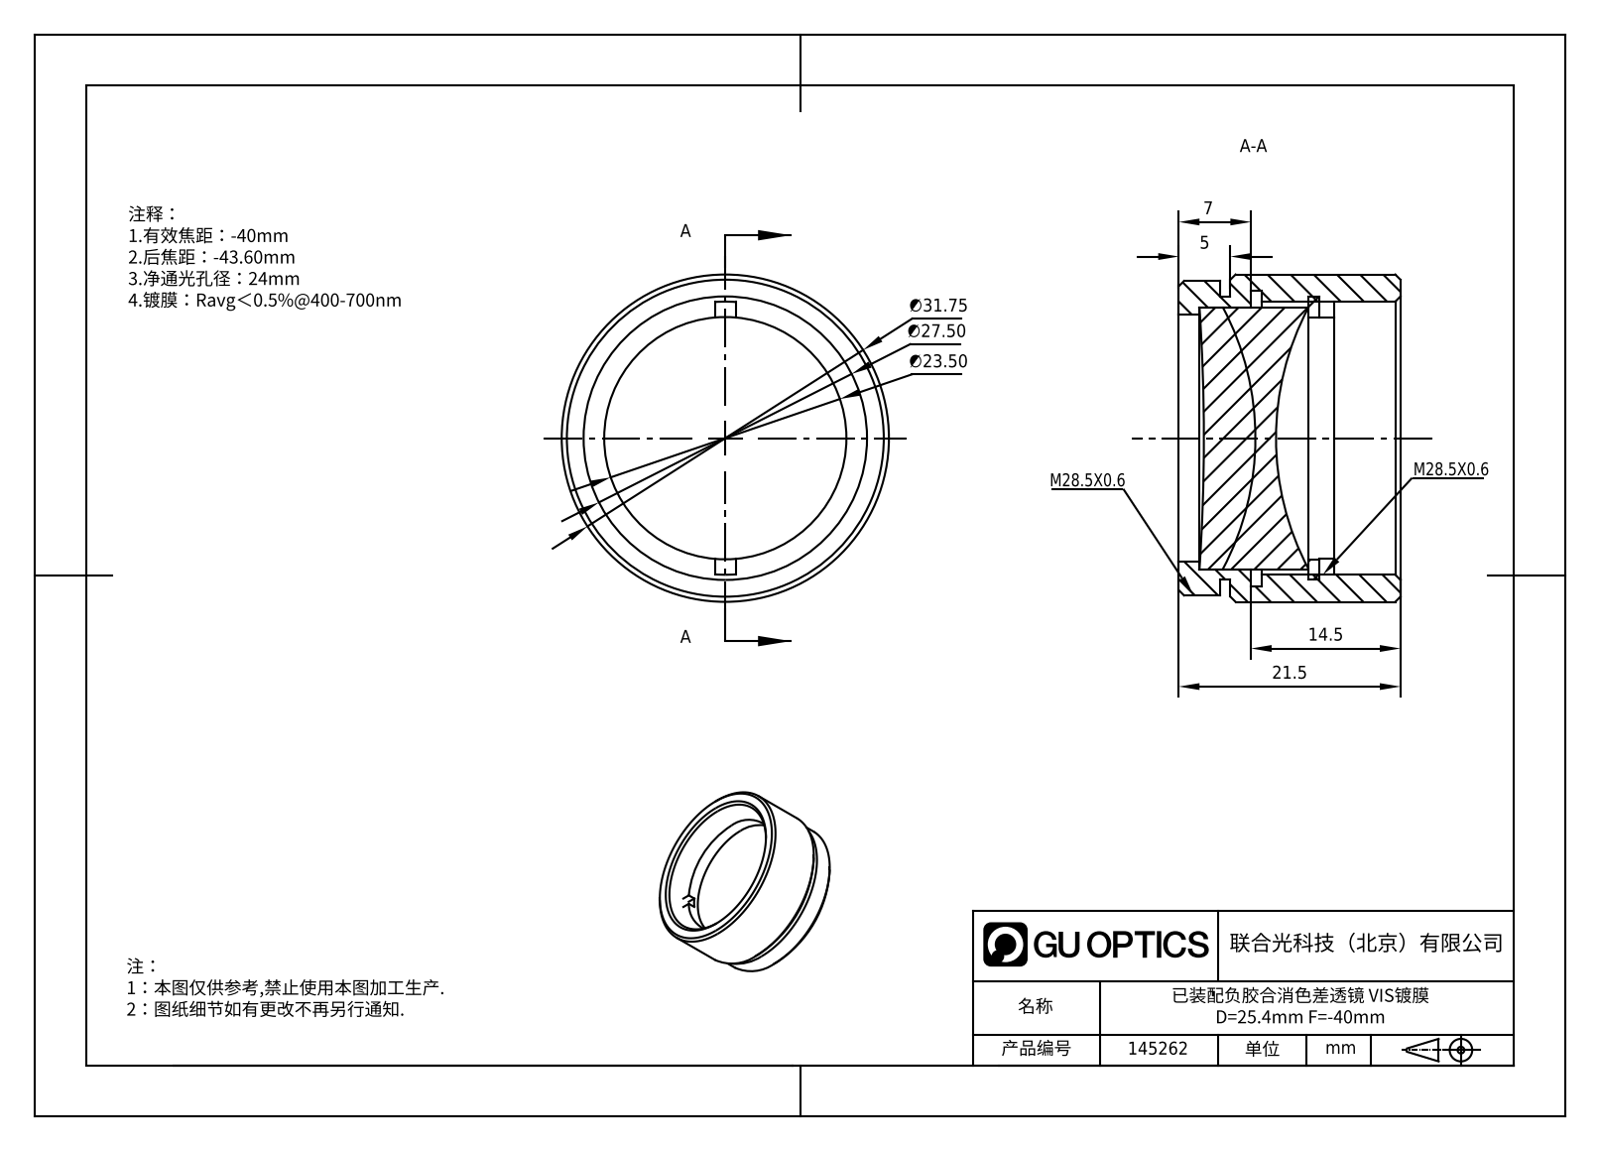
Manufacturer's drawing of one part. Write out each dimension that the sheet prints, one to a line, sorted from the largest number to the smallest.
∅31.75
∅27.50
∅23.50
21.5
14.5
7
5
